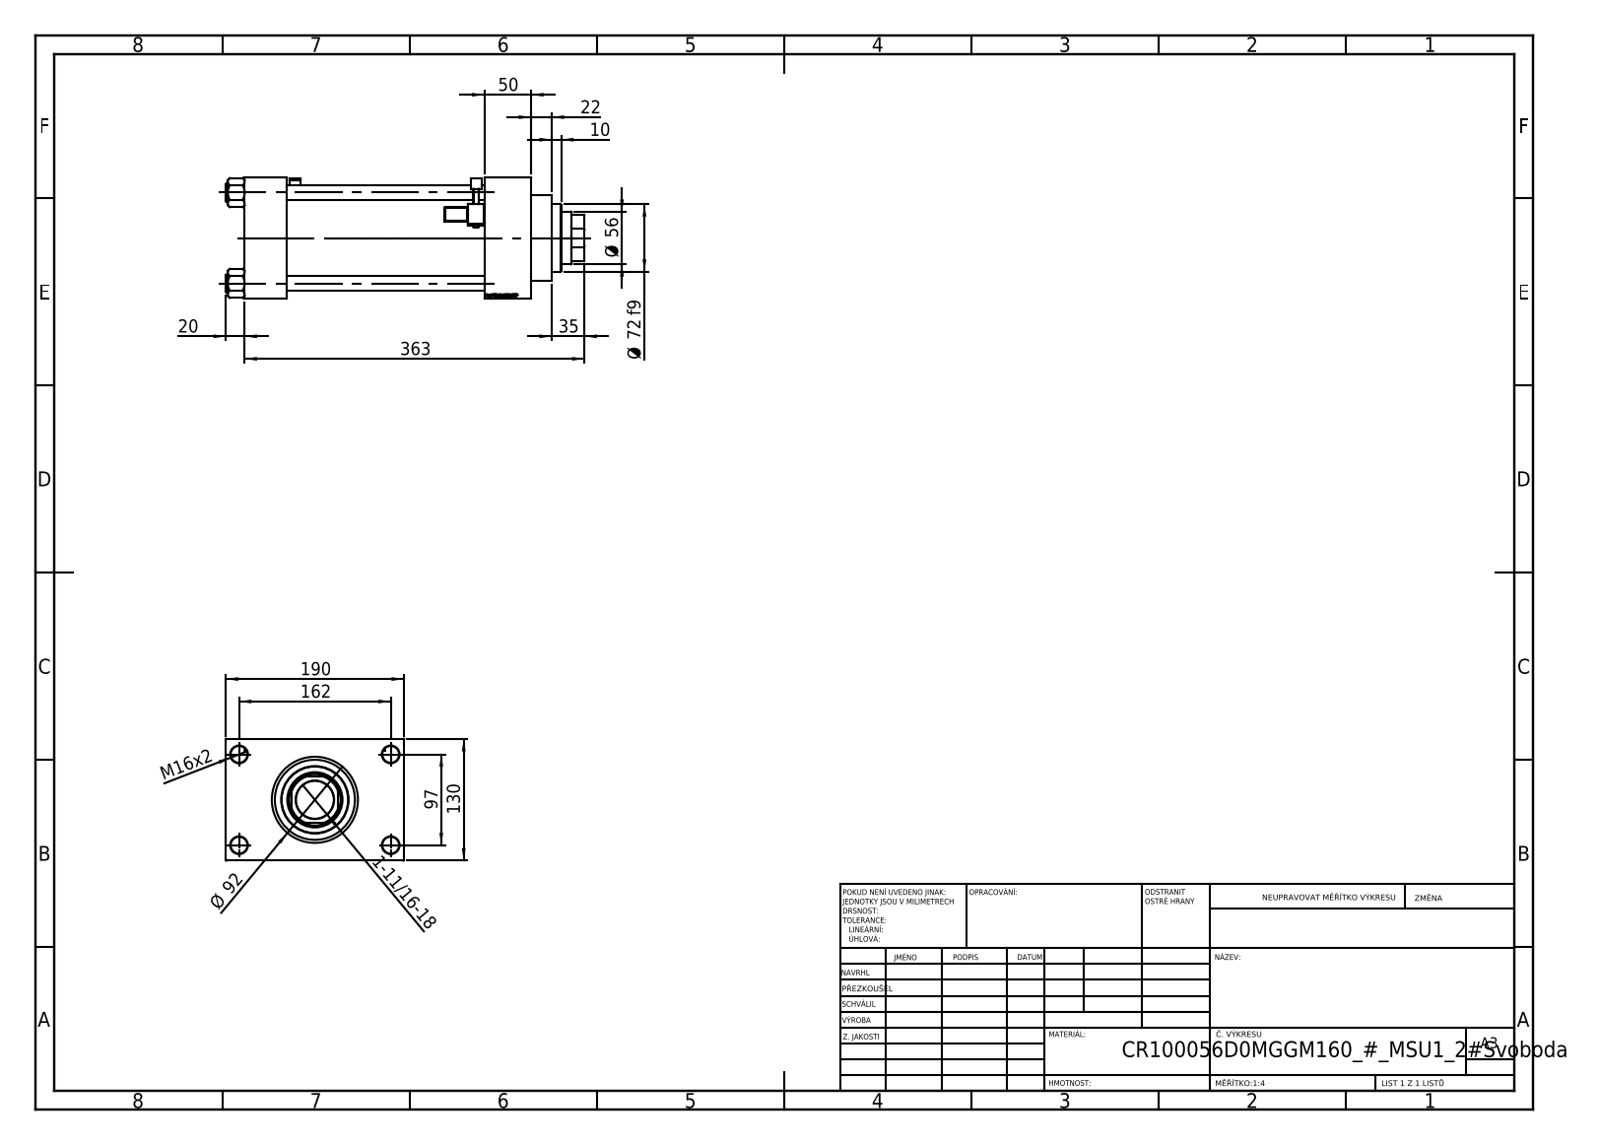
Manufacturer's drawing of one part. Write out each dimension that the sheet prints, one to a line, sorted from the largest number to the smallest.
363
190
162
130
97
Ø 92
Ø 72 f9
Ø 56
50
35
22
20
M16x2
10
1-11/16-18
